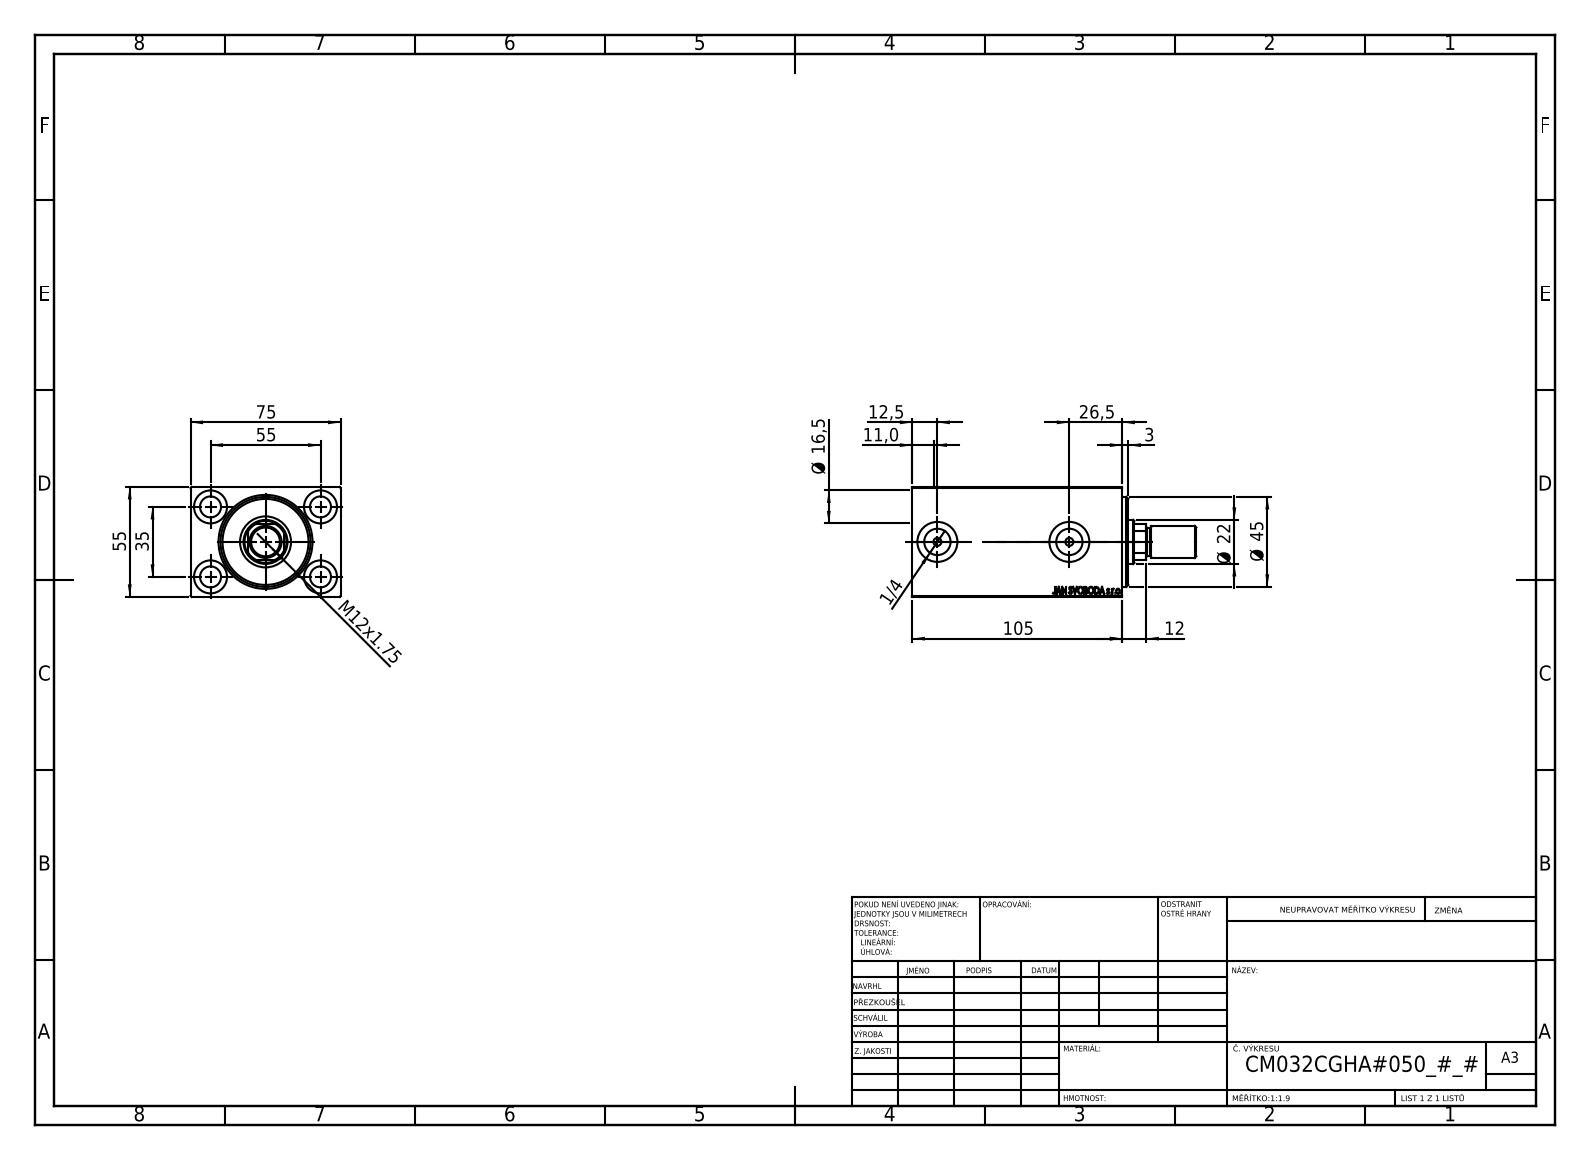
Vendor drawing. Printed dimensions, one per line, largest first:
105
75
55
55
Ø 45
35
26,5
Ø 22
Ø 16,5
12,5
M12x1.75
12
11,0
3
1/4
